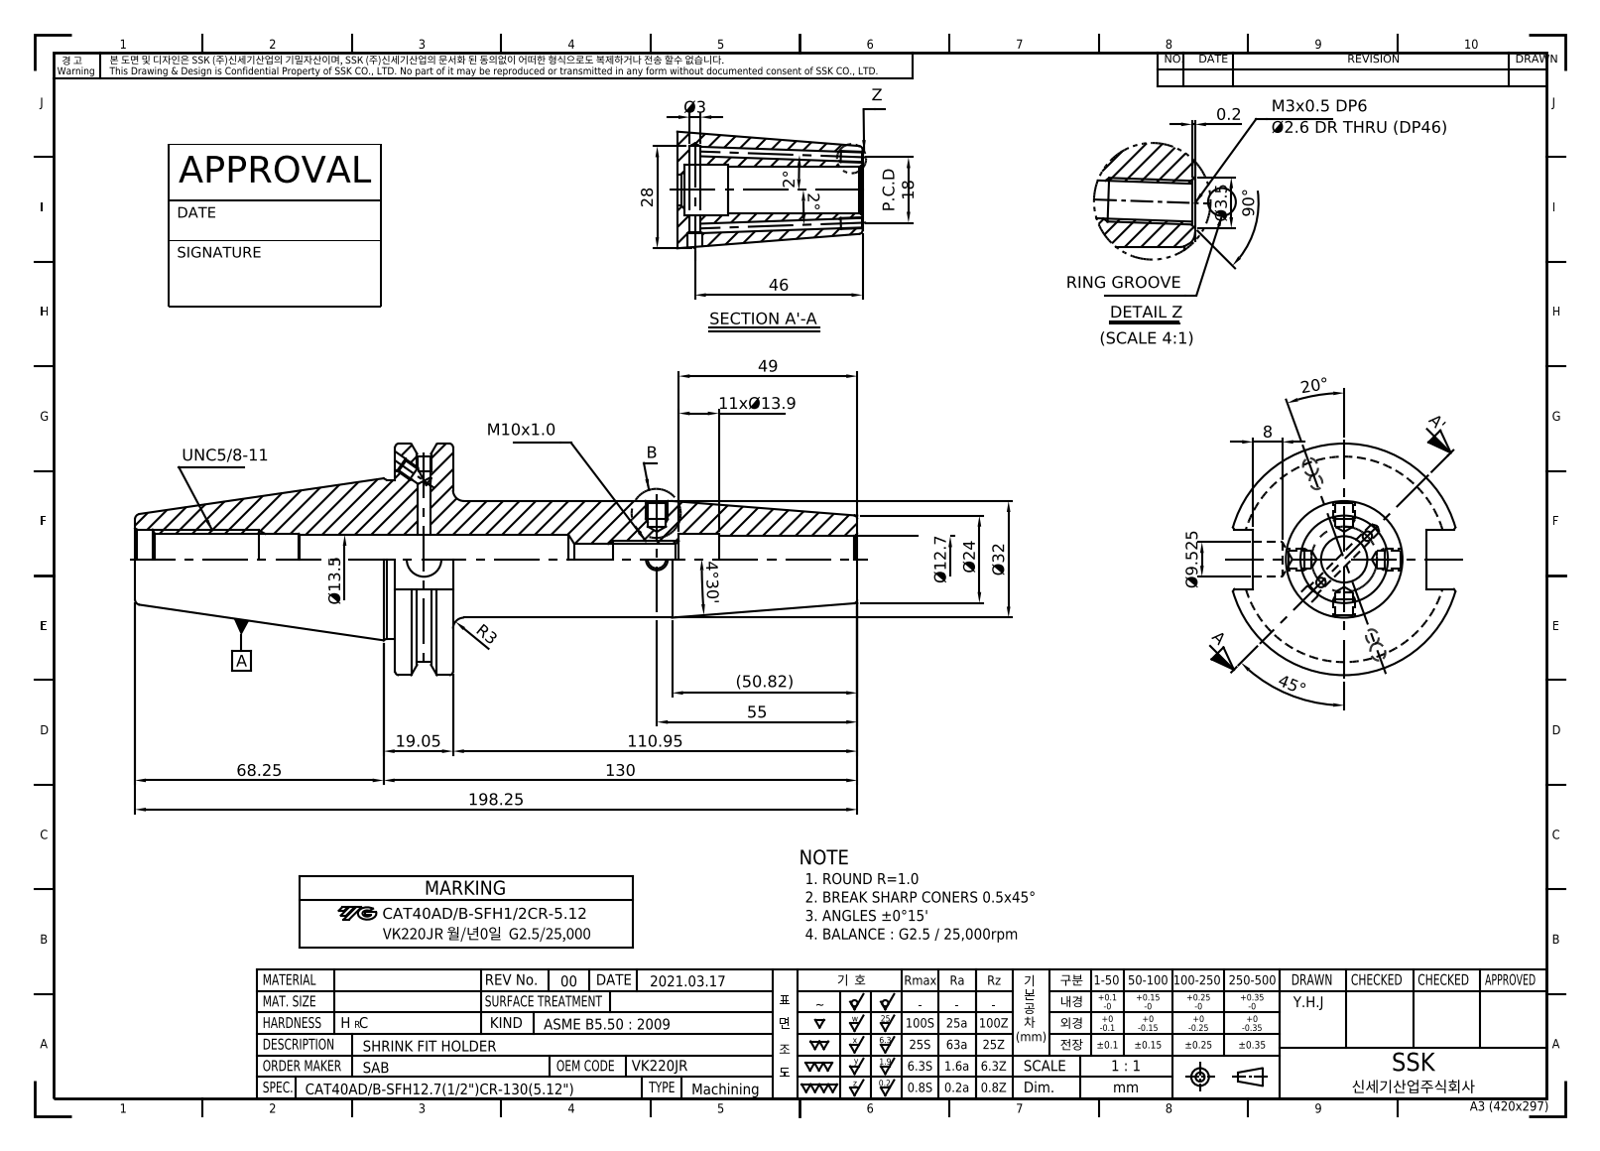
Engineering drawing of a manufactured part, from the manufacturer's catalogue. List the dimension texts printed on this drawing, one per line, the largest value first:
198.25
130
110.95
90°
68.25
55
(50.82)
49
46
45°
Ø32
28
Ø24
20°
19.05
P.C.D 18
11xØ13.9
Ø13.5
Ø12.7
Ø9.525
8
4°30'
Ø3.5
R3
Ø3
2°
2°
0.2
